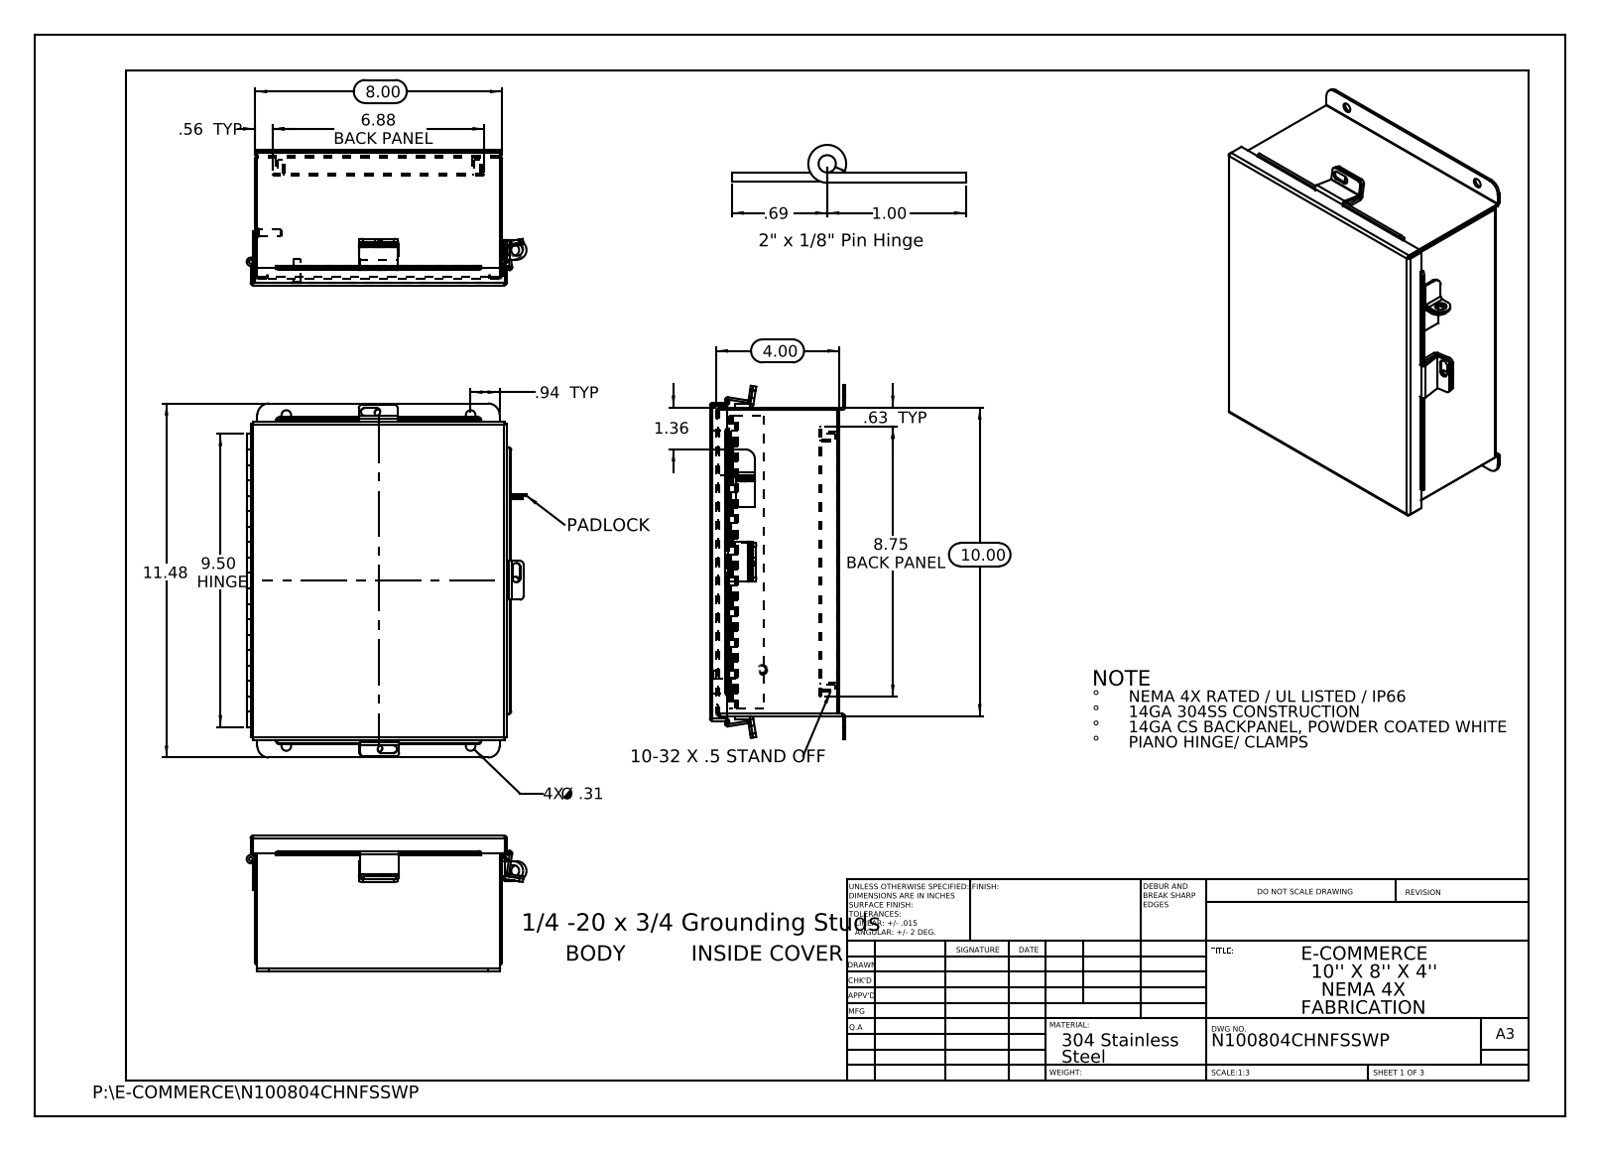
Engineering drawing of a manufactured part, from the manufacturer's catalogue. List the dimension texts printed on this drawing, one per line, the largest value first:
11.48
10.00
9.50 HINGE
8.75 BACK PANEL
8.00
6.88 BACK PANEL
4.00
1.36
1.00
.94 TYP
.69
.63 TYP
.56 TYP
4X Ø .31
